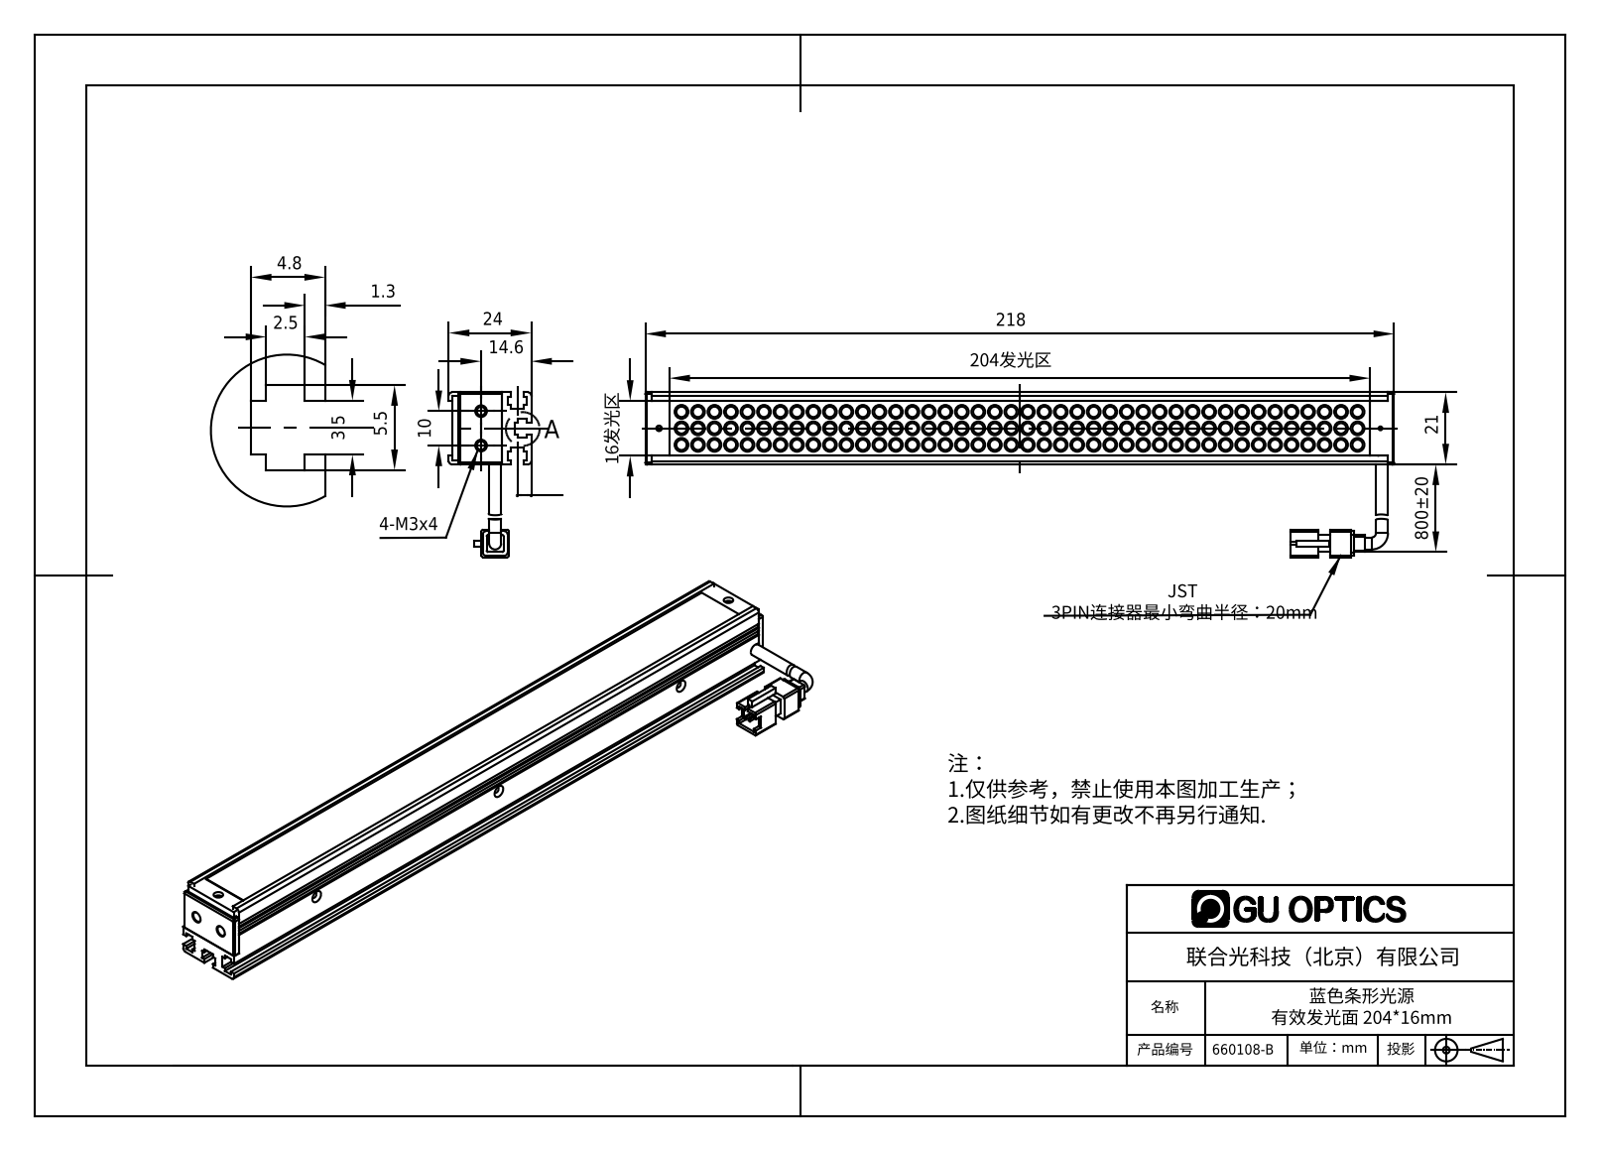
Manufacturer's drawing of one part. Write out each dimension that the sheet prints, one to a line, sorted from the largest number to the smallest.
800±20
218
204发光区
24
21
16发光区
14.6
10
5.5
4.8
3.5
3
2.5
1.3
